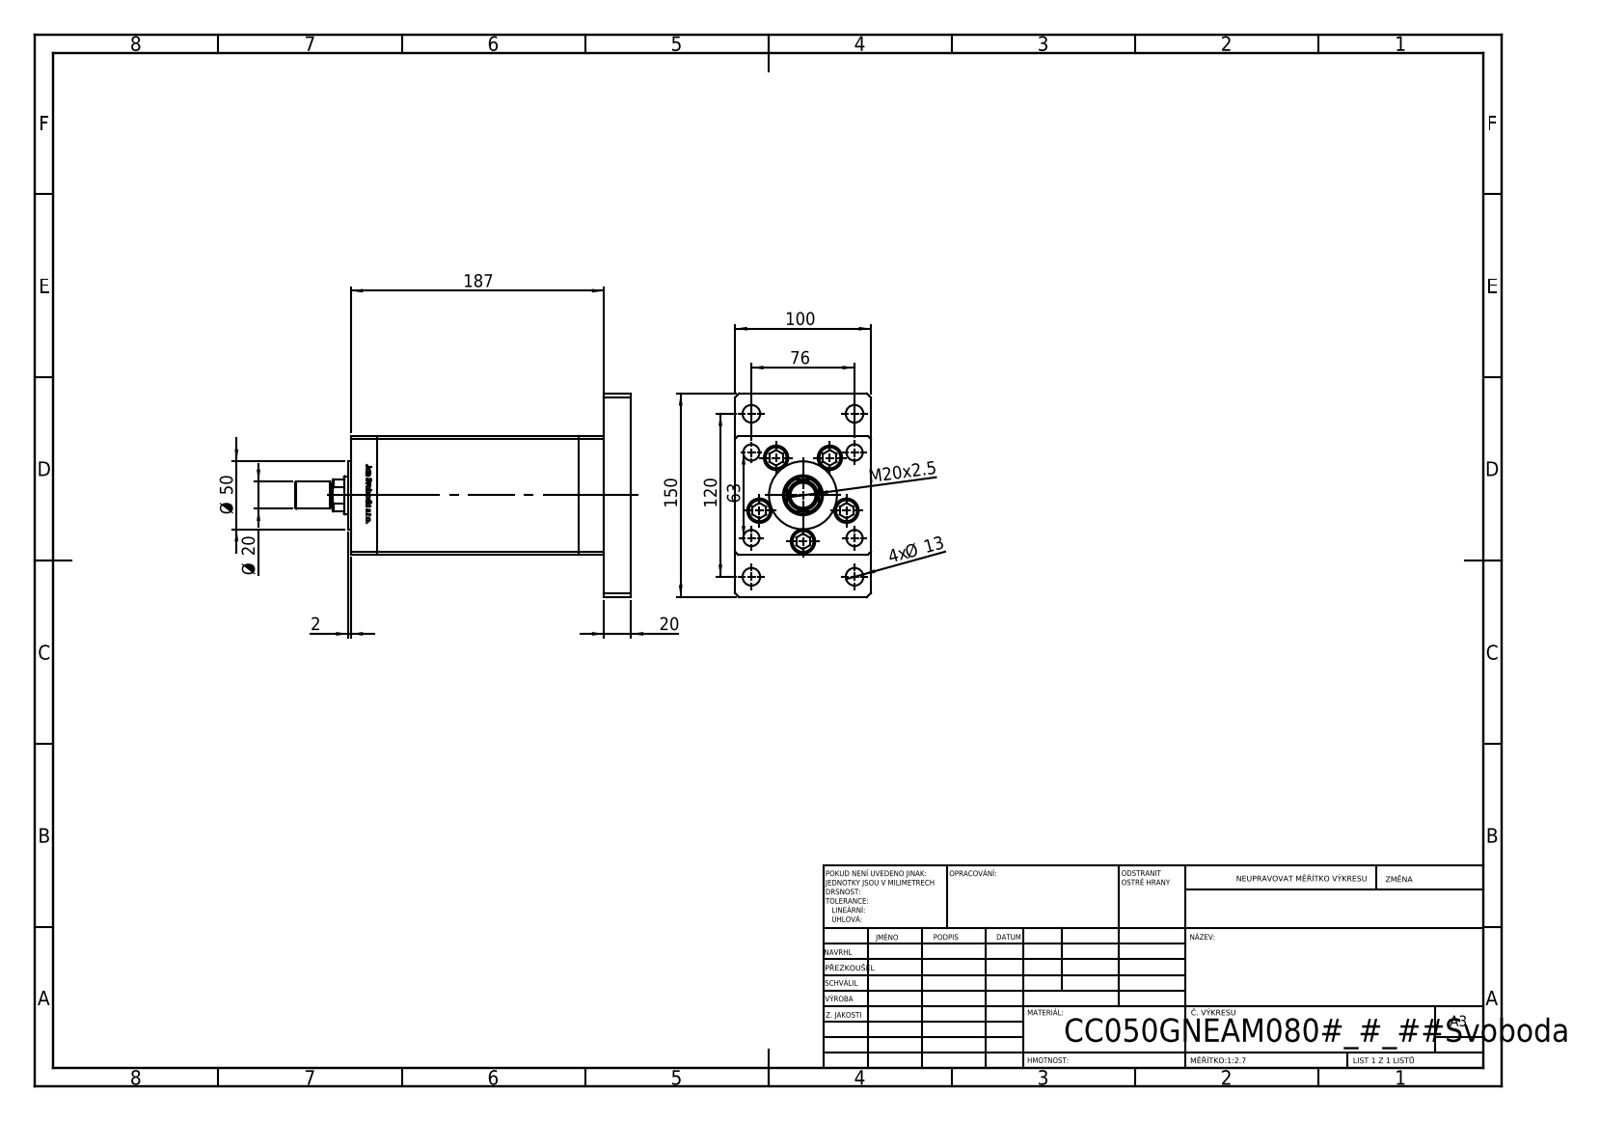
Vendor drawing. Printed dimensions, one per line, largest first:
187
150
120
100
76
63
Ø 50
20
Ø 20
M20x2.5
4x Ø 13
2
